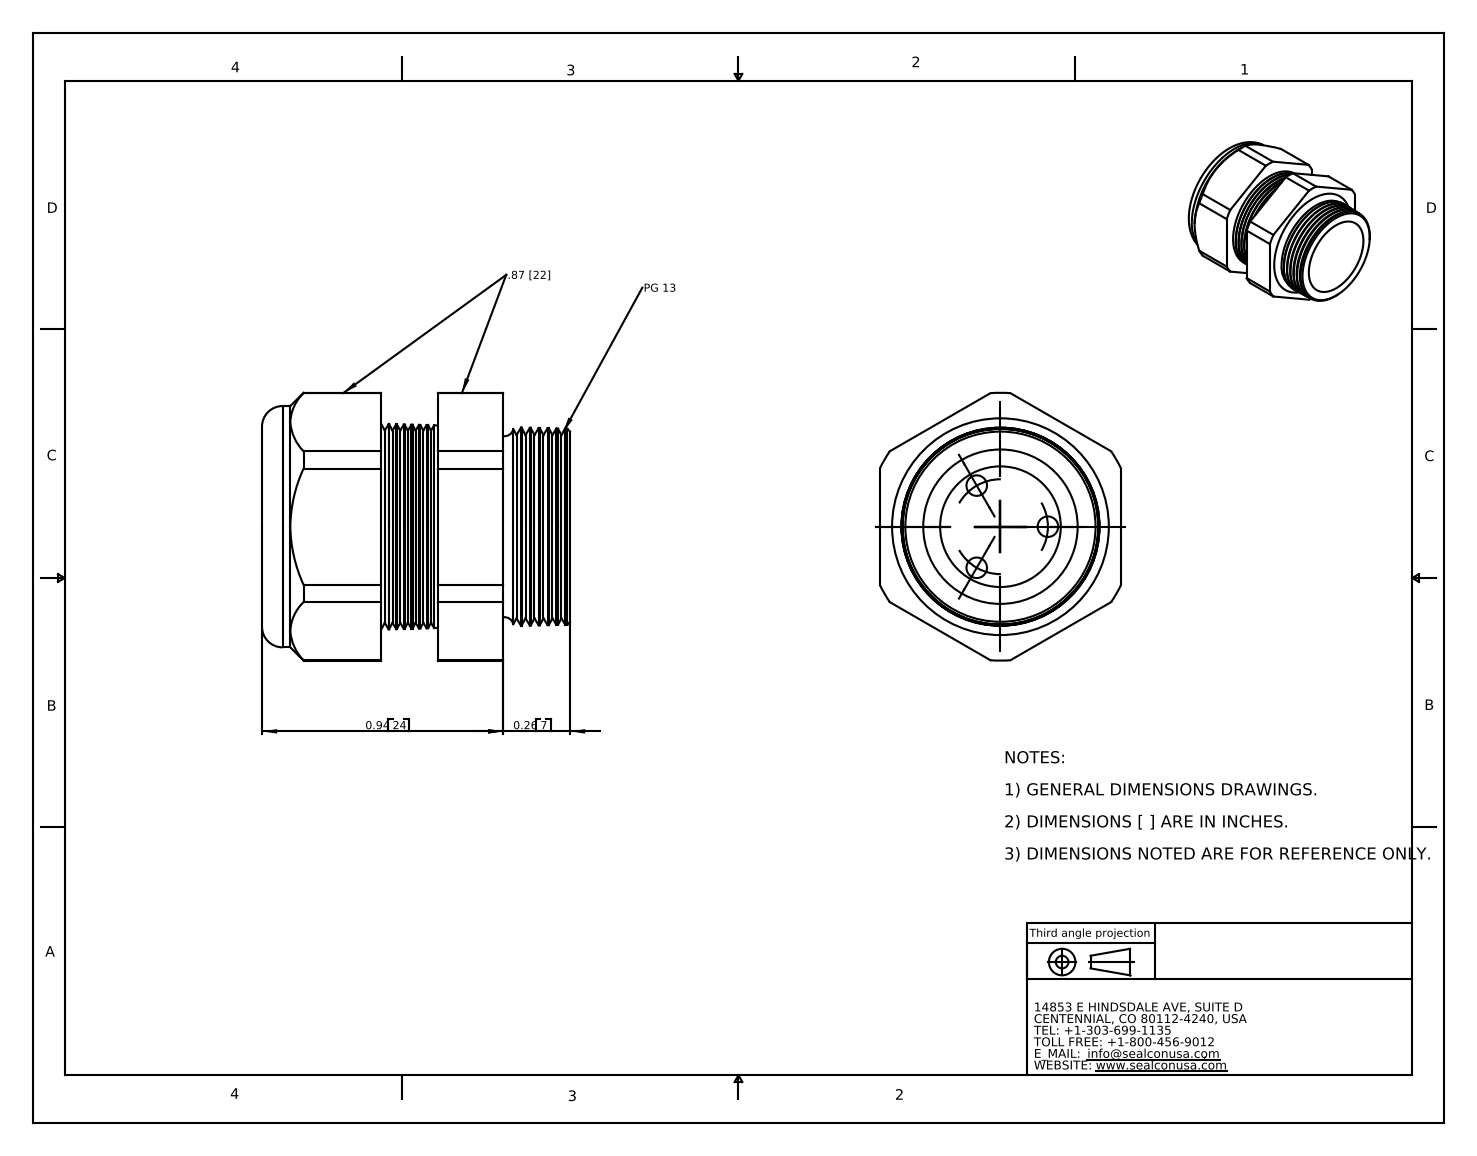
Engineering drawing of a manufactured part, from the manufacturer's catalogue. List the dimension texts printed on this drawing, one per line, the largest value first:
0.94 24
0.26 7
